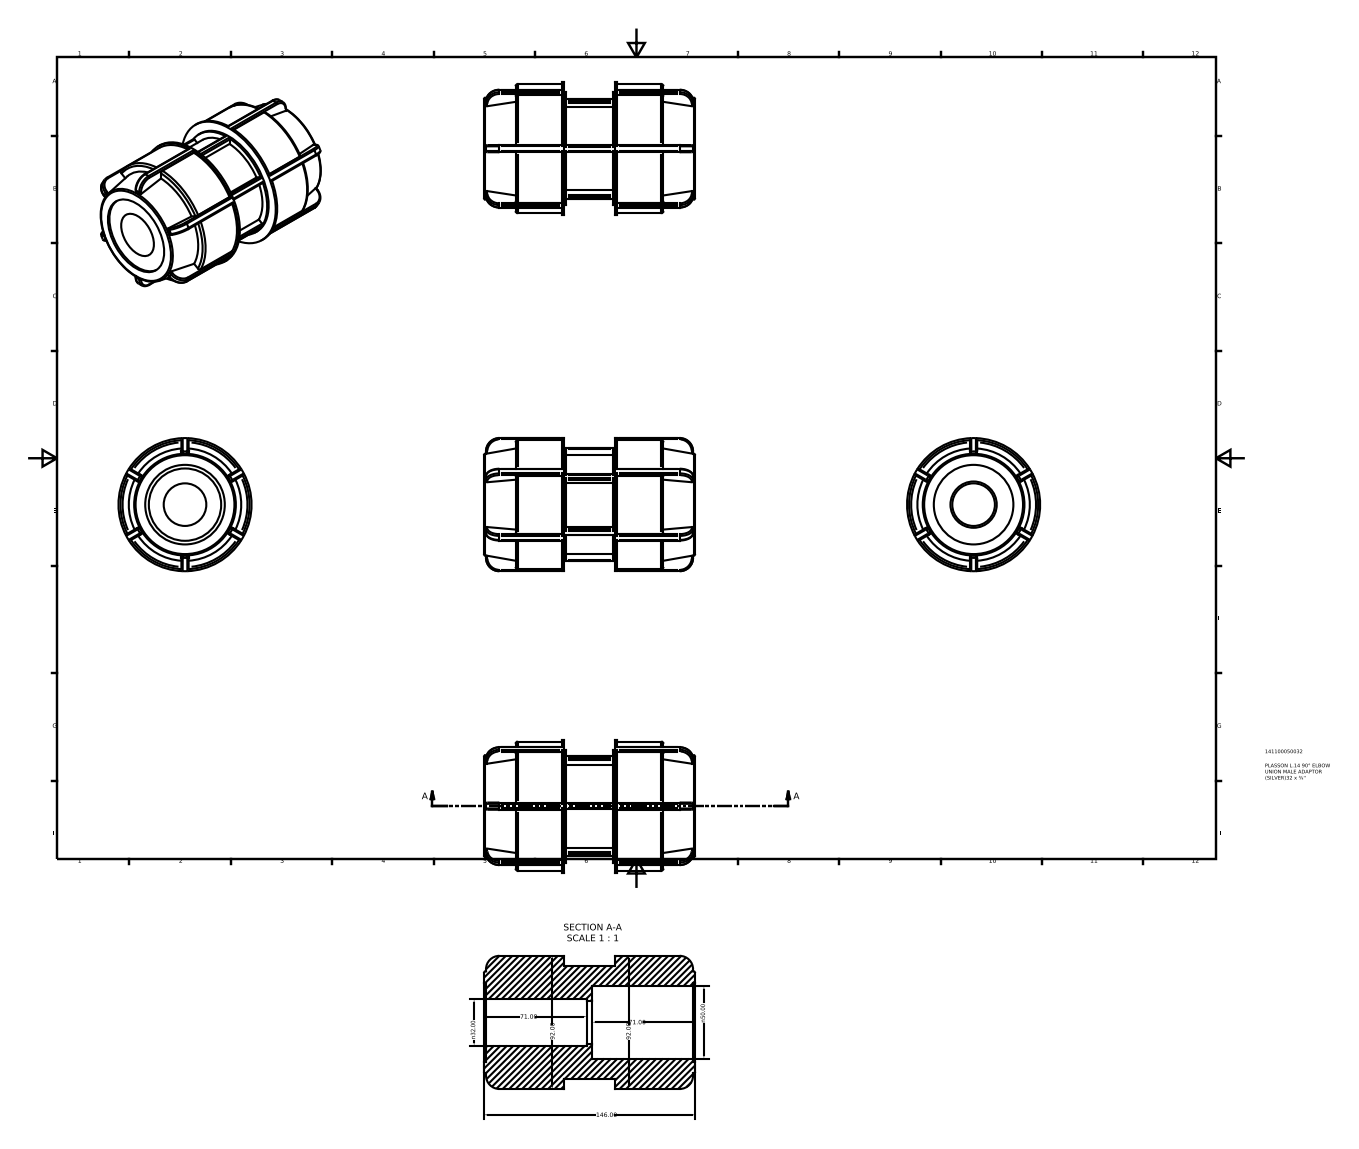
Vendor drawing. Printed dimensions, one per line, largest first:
146.00
92.00
92.00
71.00
71.00
n50.00
n32.00
